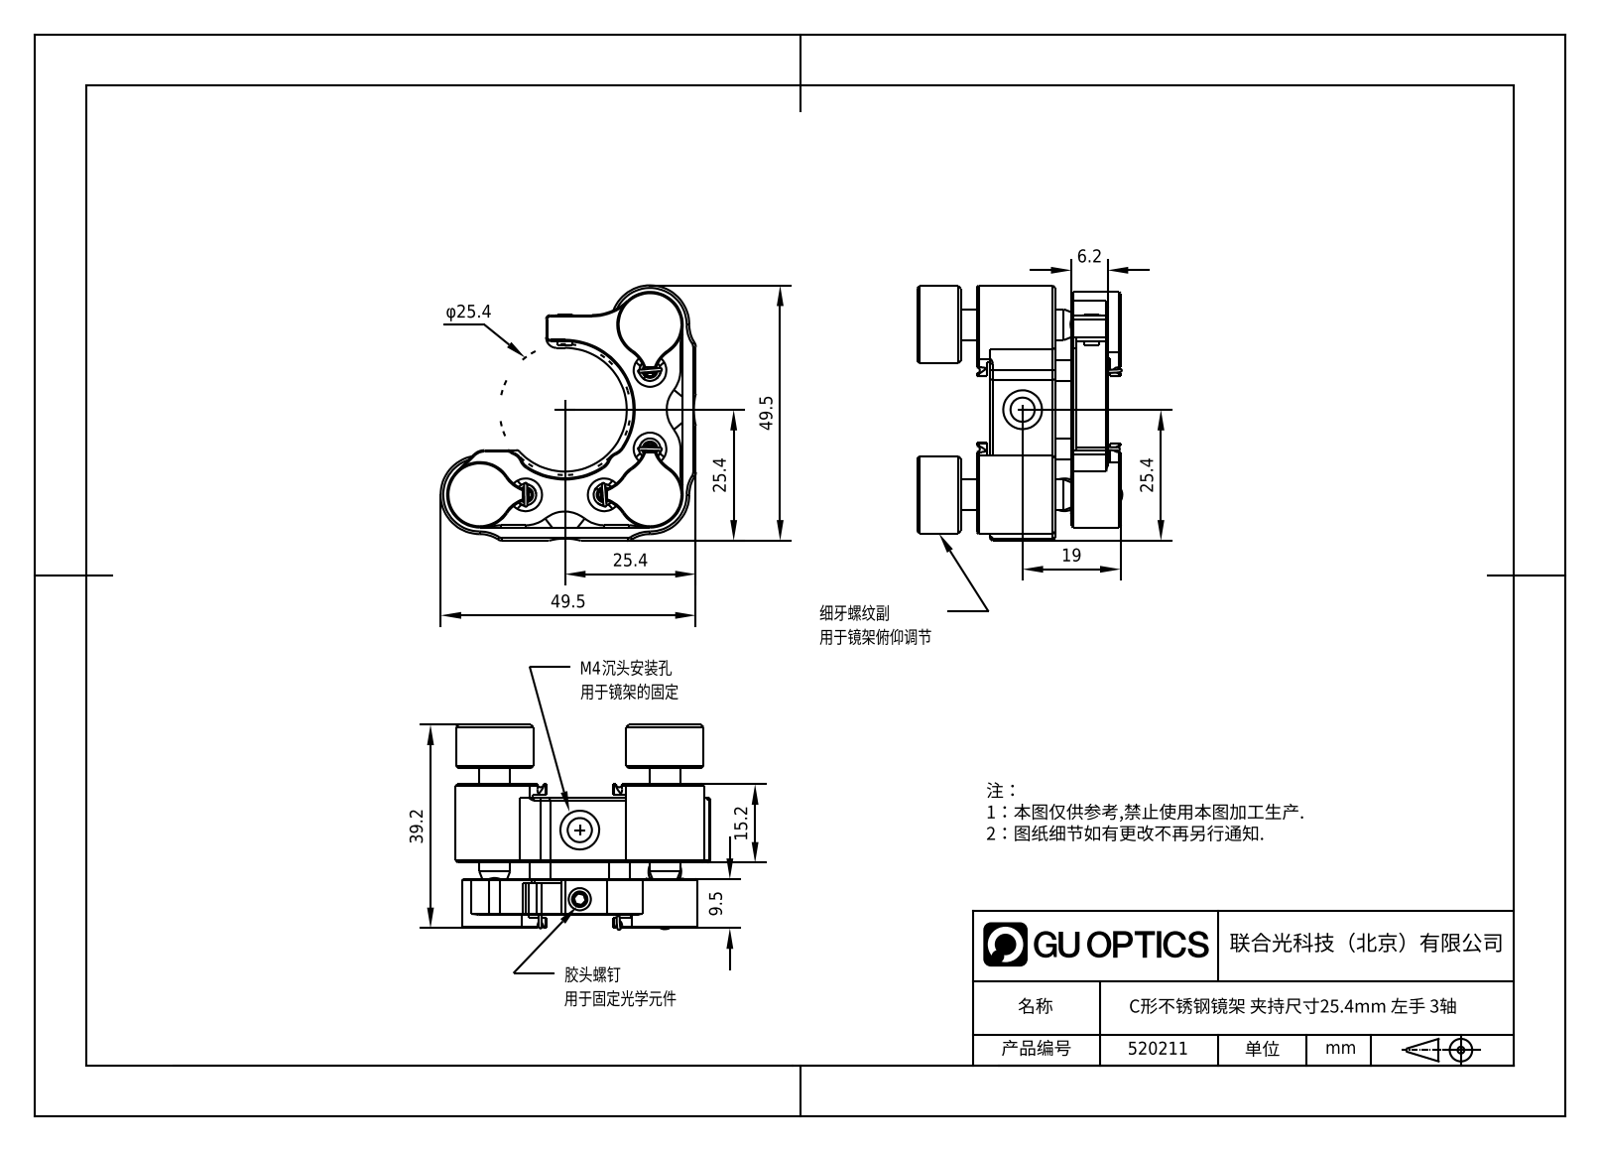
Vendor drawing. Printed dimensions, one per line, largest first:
49.5
49.5
39.2
25.4
25.4
25.4
19
15.2
9.5
6.2
